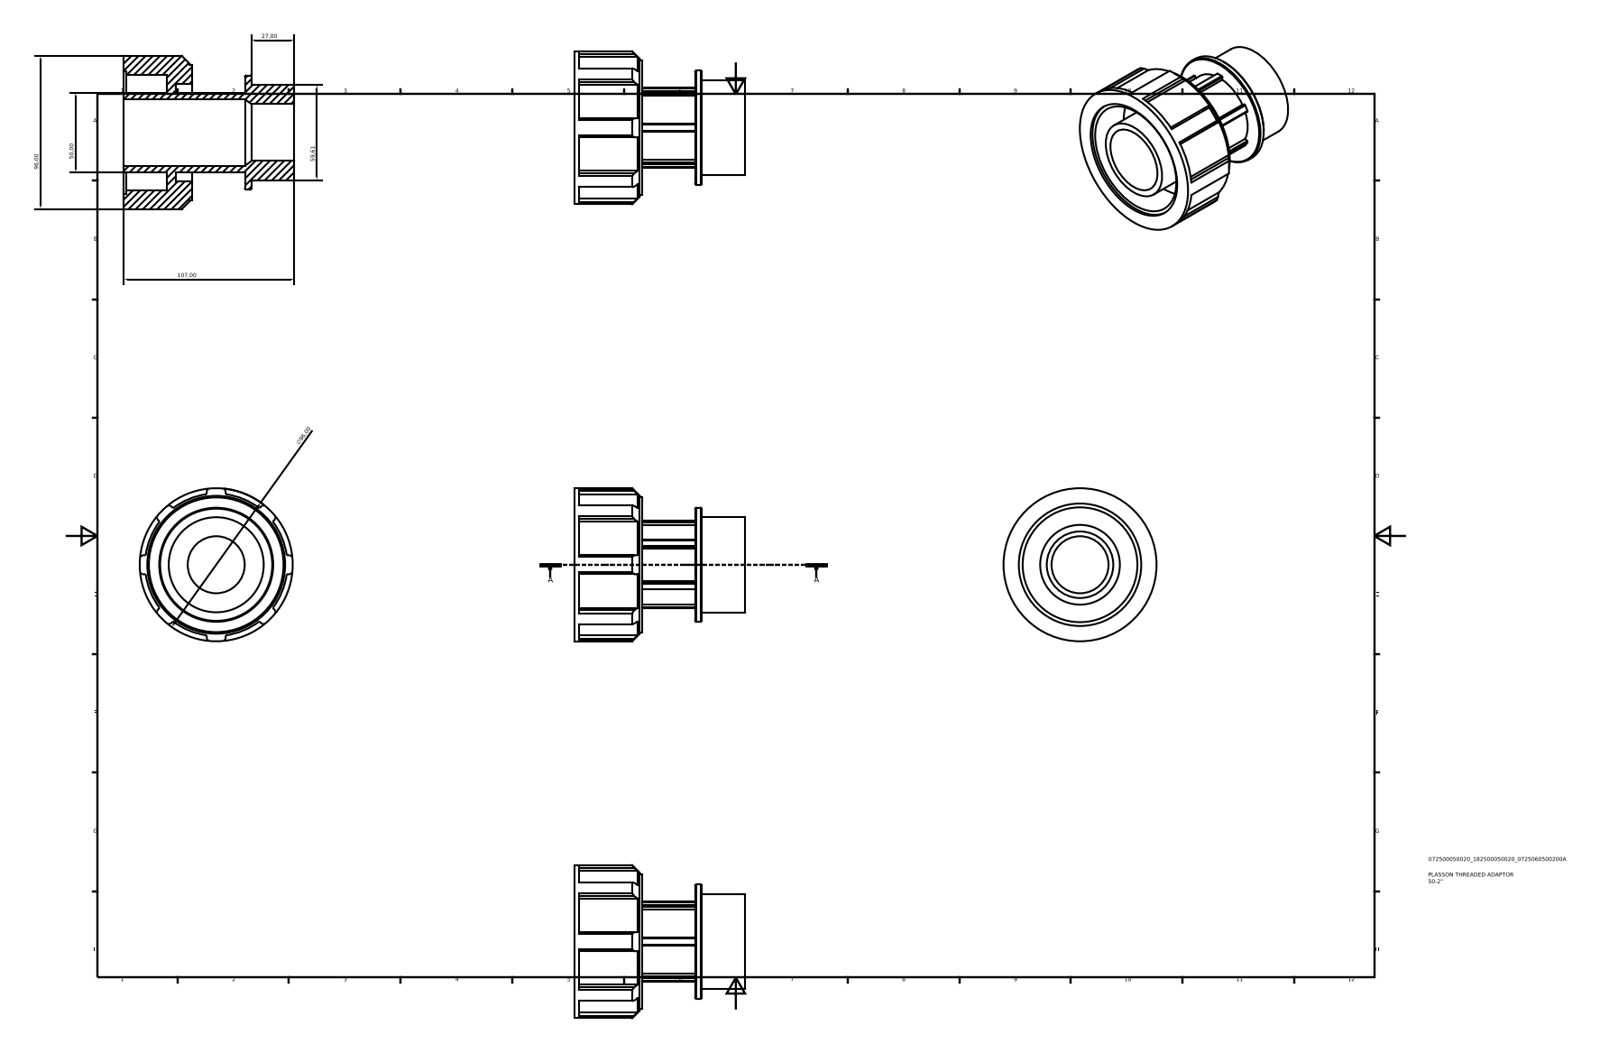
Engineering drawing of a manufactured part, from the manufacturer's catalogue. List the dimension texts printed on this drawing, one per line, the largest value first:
107,00
96,00
∅96,00
59,61
50,00
27,00
